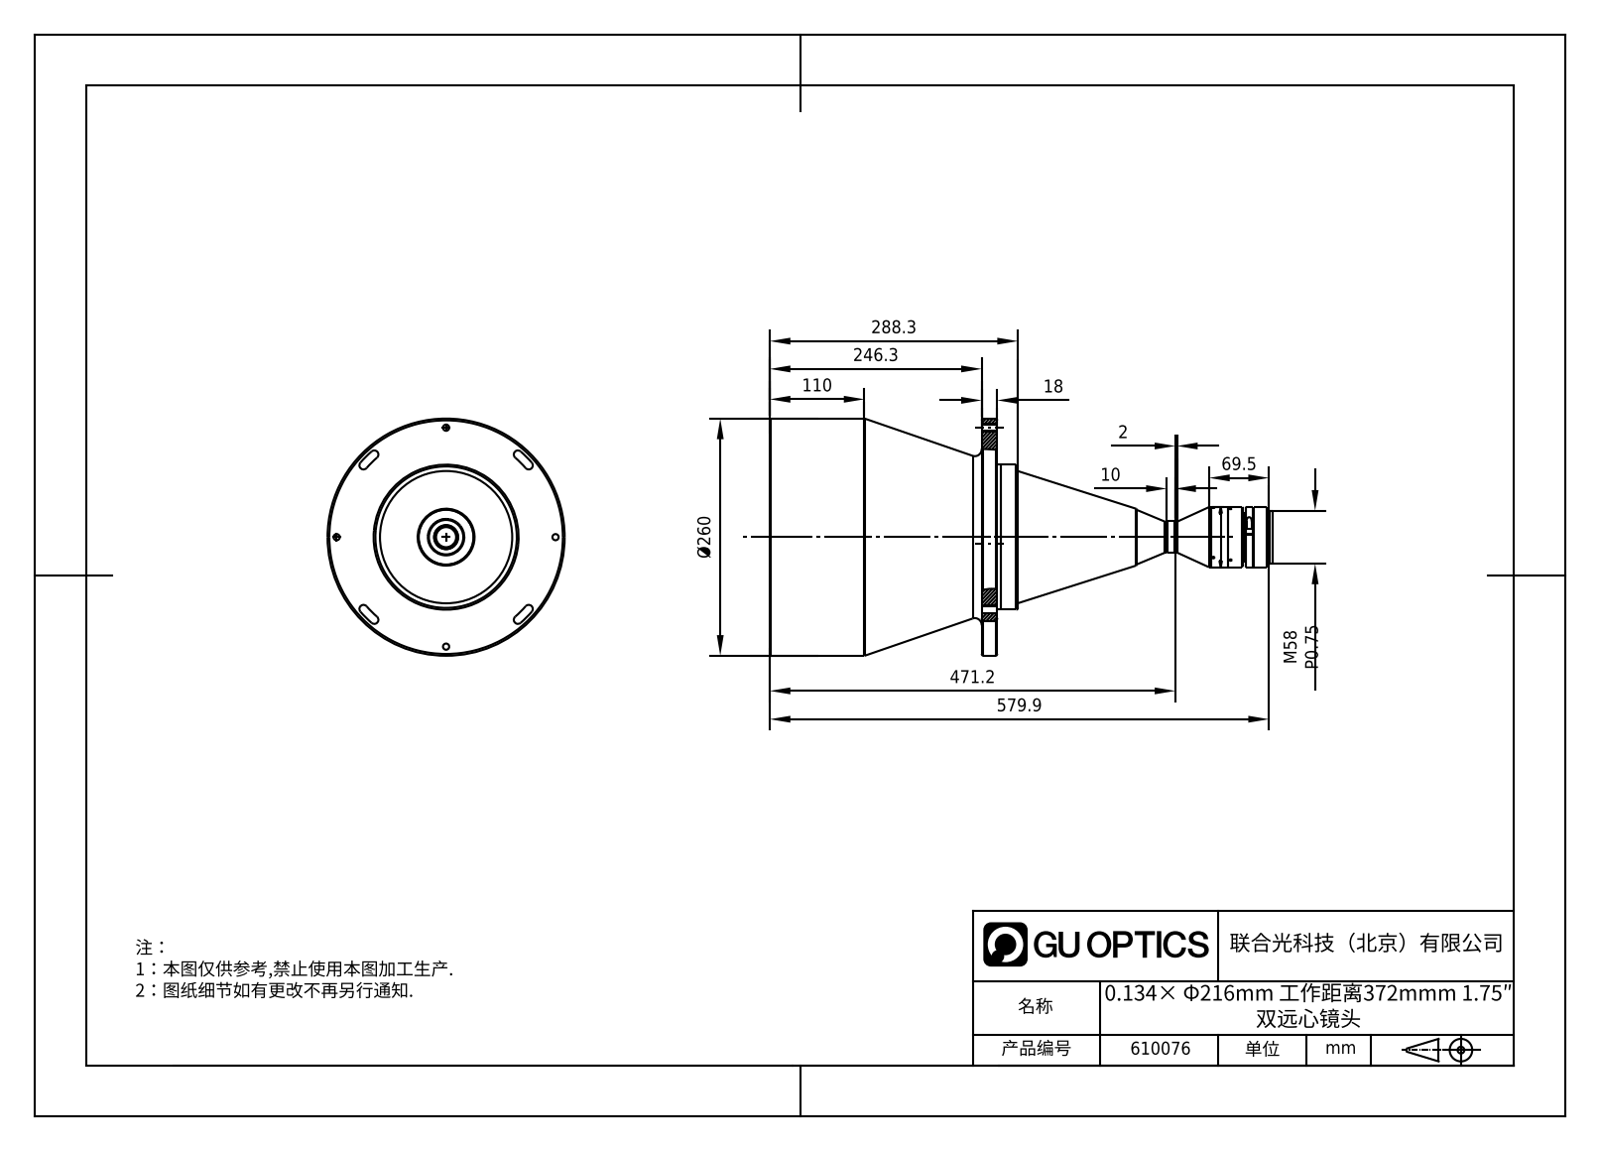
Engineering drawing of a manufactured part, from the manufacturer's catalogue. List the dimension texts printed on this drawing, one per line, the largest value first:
579.9
471.2
288.3
Ø260
246.3
110
69.5
M58 P0.75
18
10
2
